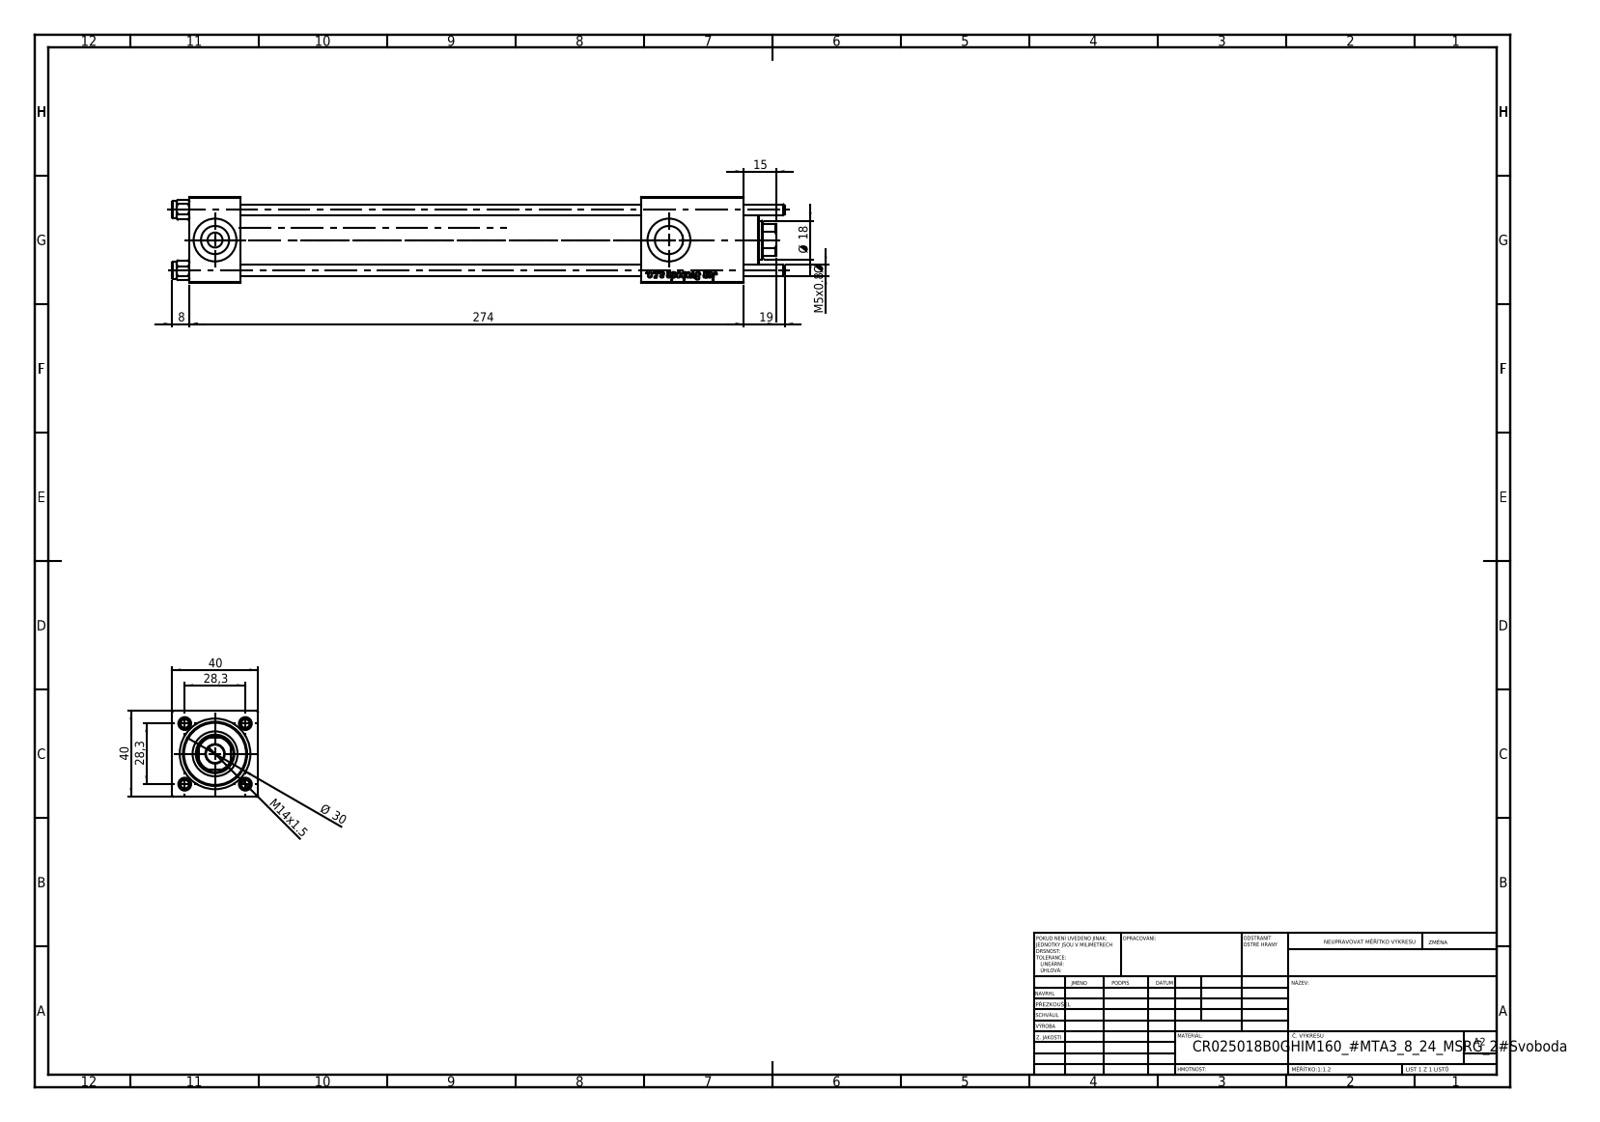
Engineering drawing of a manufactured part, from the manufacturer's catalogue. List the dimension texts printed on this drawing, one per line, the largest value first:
274
40
40
Ø 30
28,3
28,3
19
Ø 18
15
M14x1.5
8
M5x0.8 Ø
